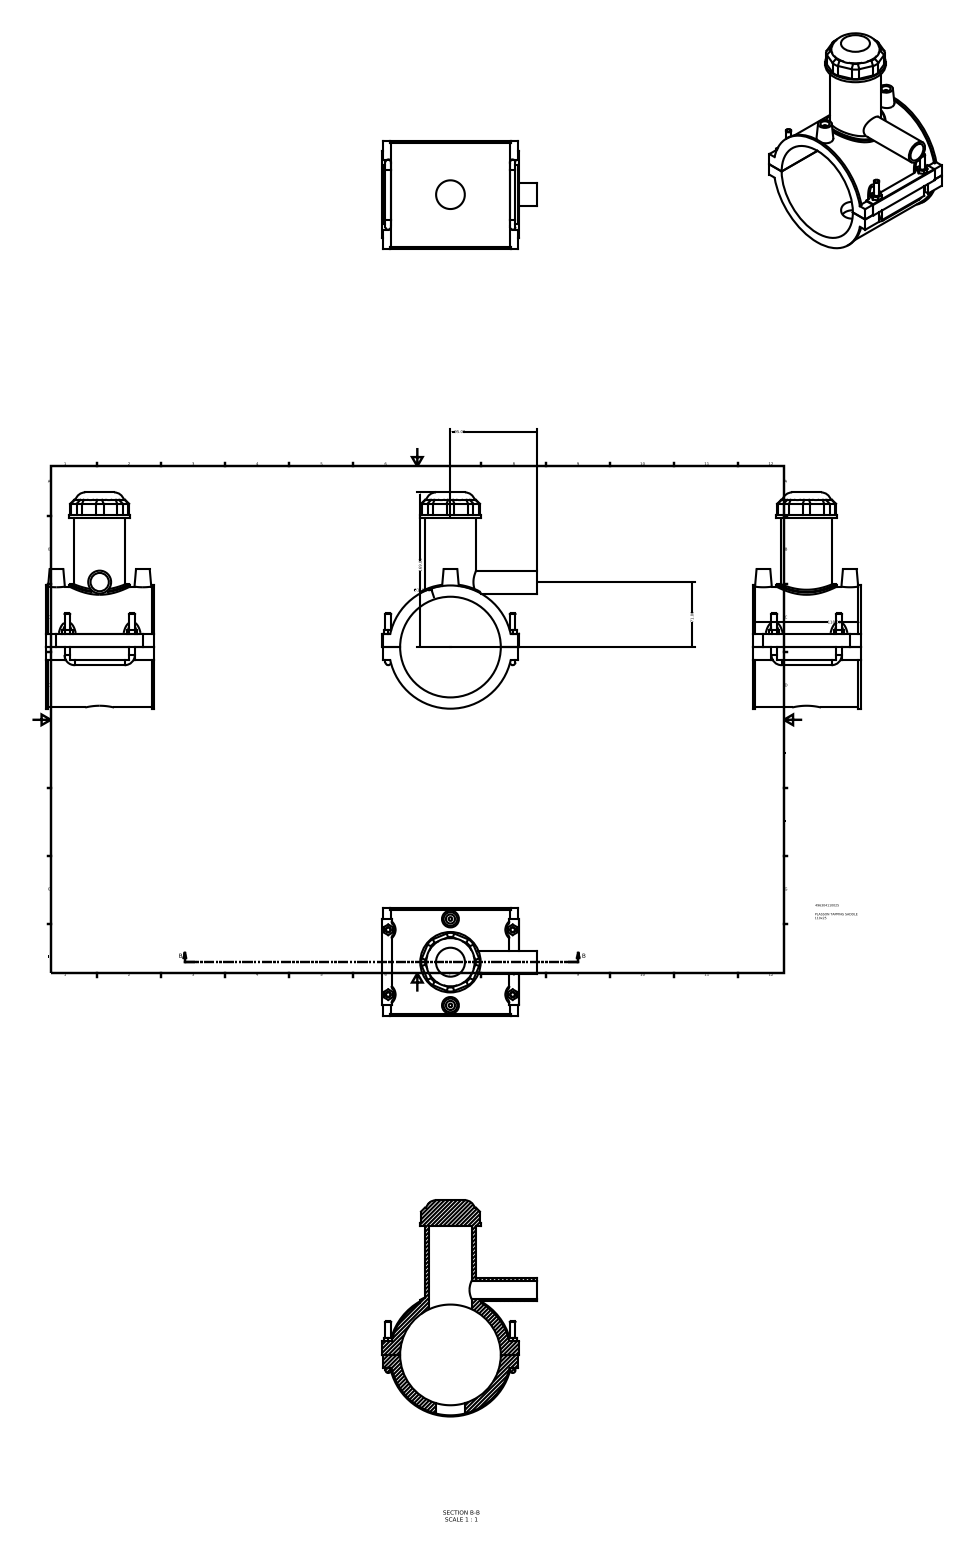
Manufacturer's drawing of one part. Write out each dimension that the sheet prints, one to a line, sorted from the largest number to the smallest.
169.00
118.00
∅110.00
95.00
71.00
